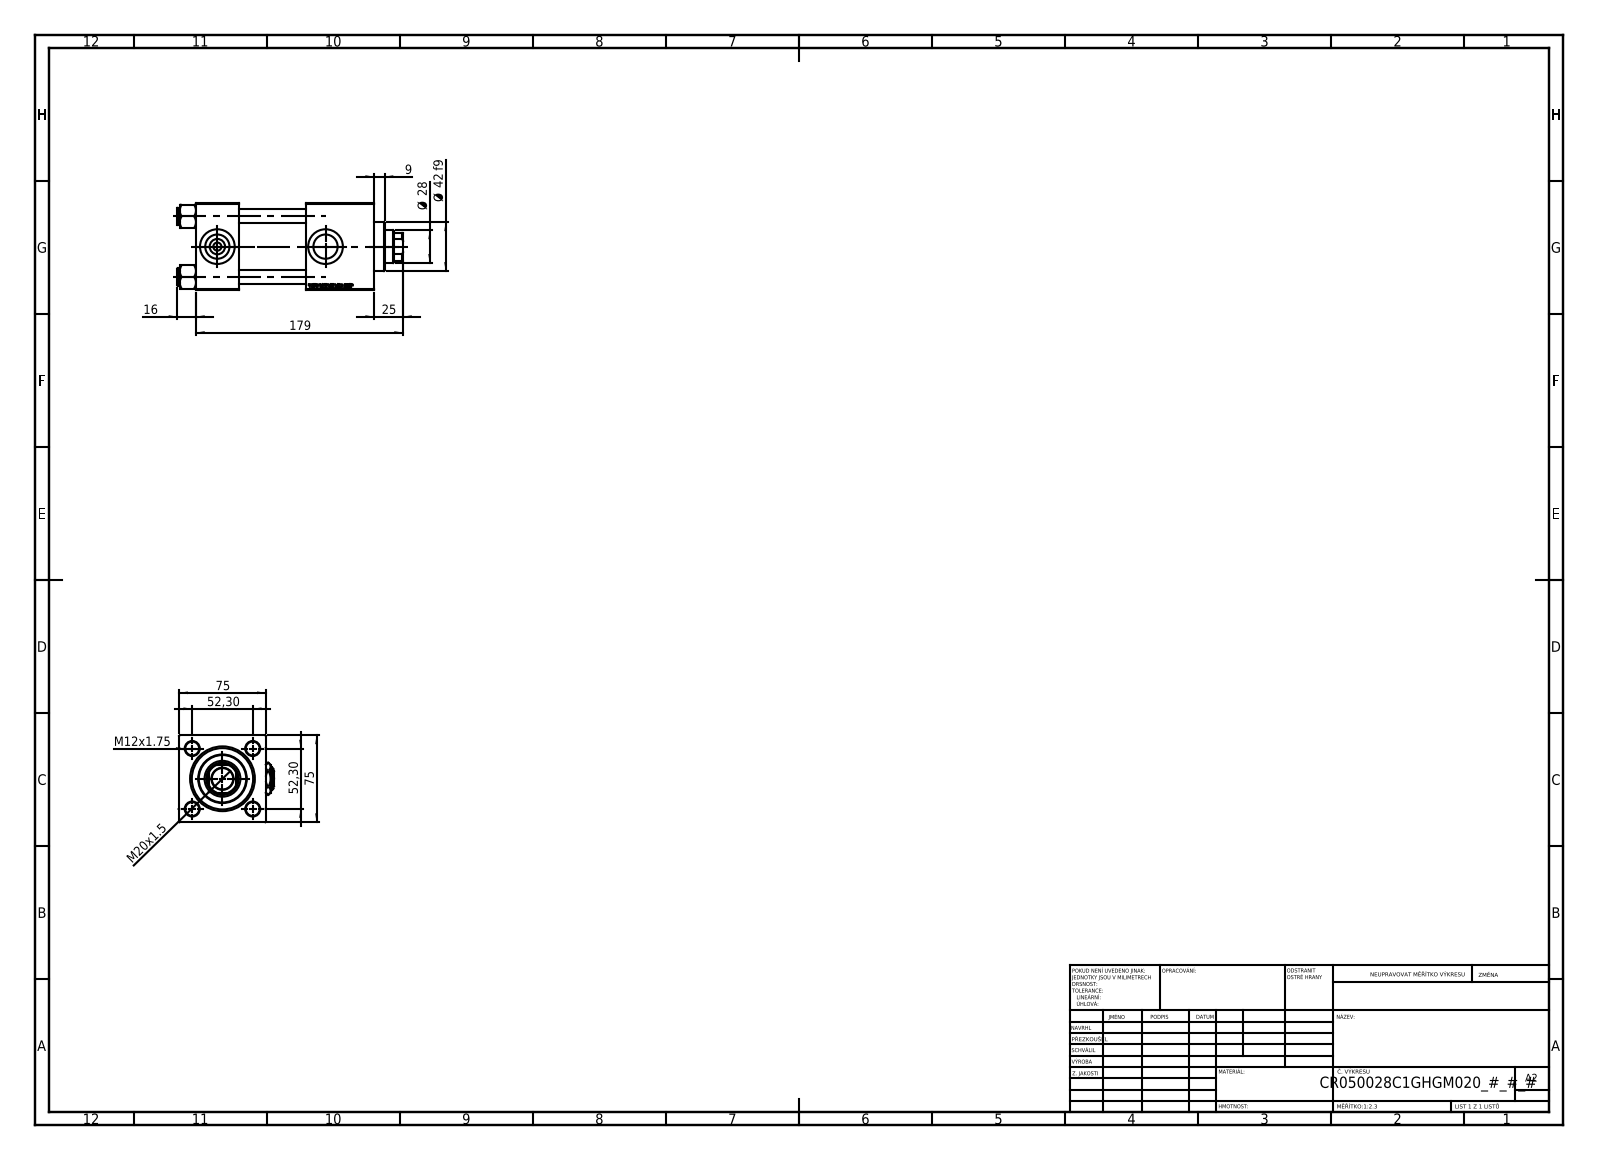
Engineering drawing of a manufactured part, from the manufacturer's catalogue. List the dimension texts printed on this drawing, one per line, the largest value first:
179
75
75
52,30
52,30
Ø 42 f9
Ø 28
25
M20x1.5
16
M12x1.75
9
